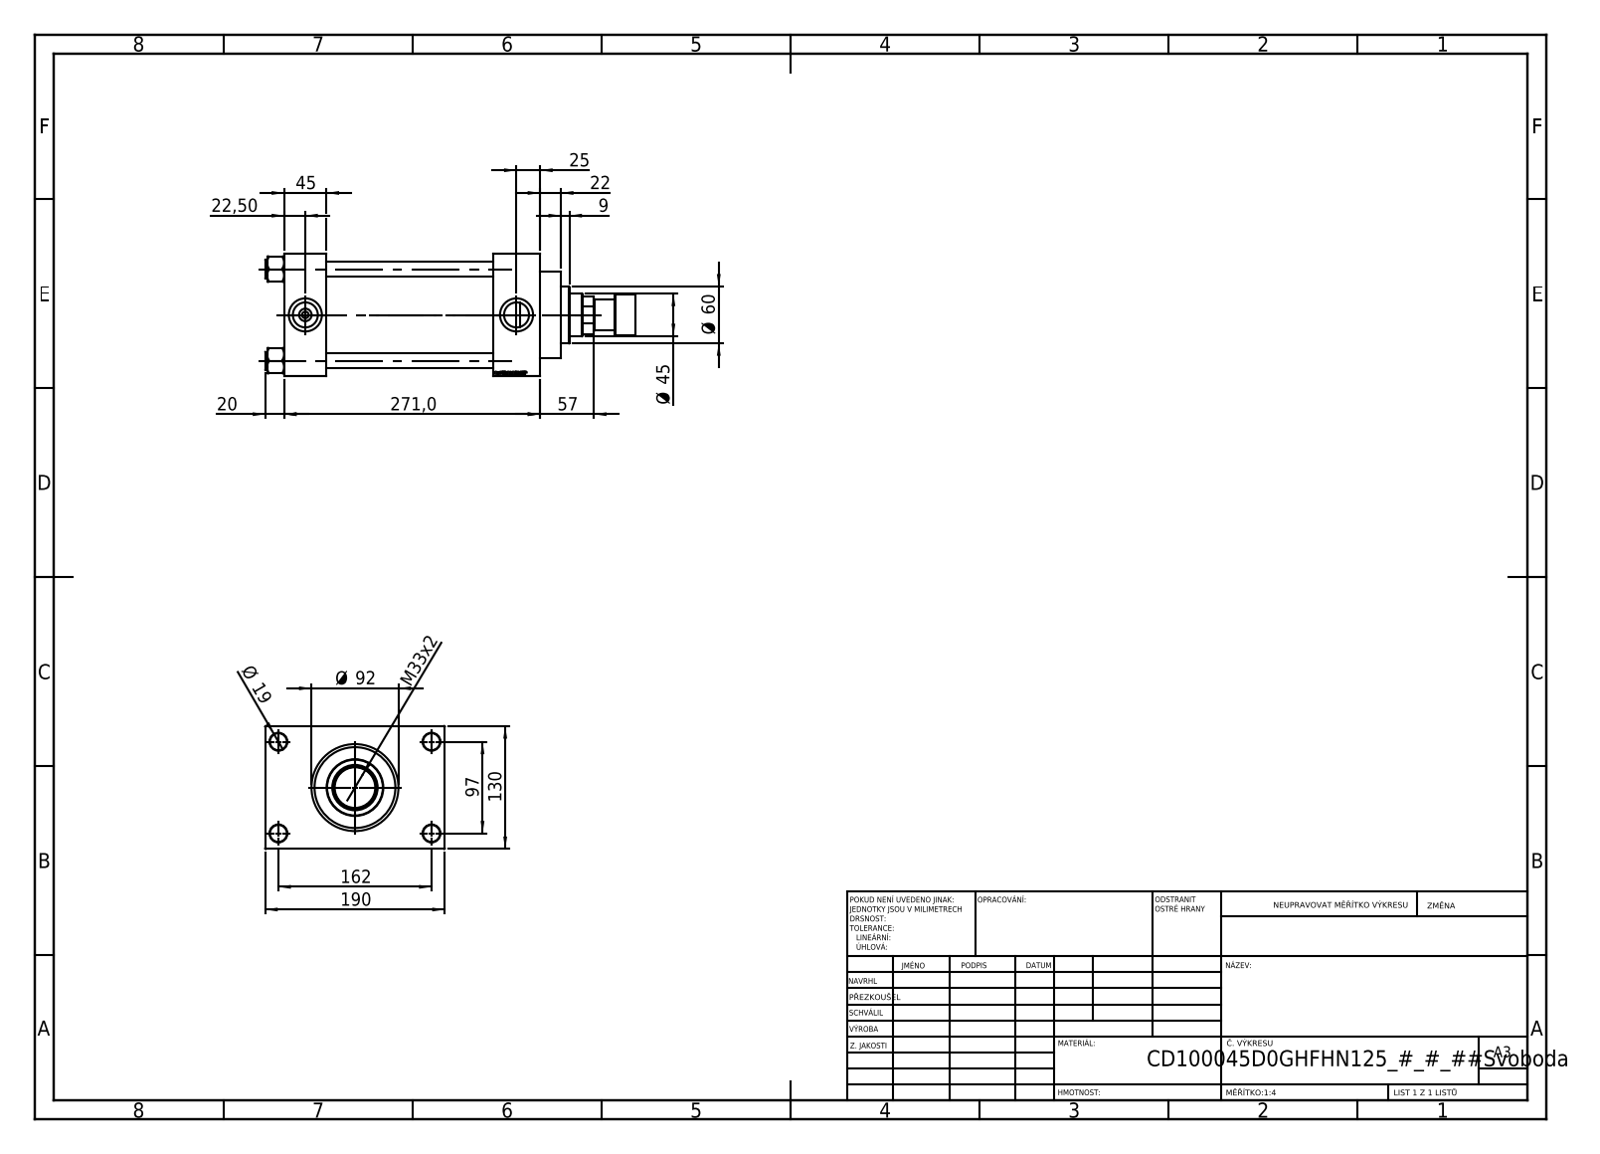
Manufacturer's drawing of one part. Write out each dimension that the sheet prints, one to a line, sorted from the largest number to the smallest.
271,0
190
162
130
97
Ø 92
Ø 60
57
Ø 45
45
M33x2
25
22,50
22
20
Ø 19
9
